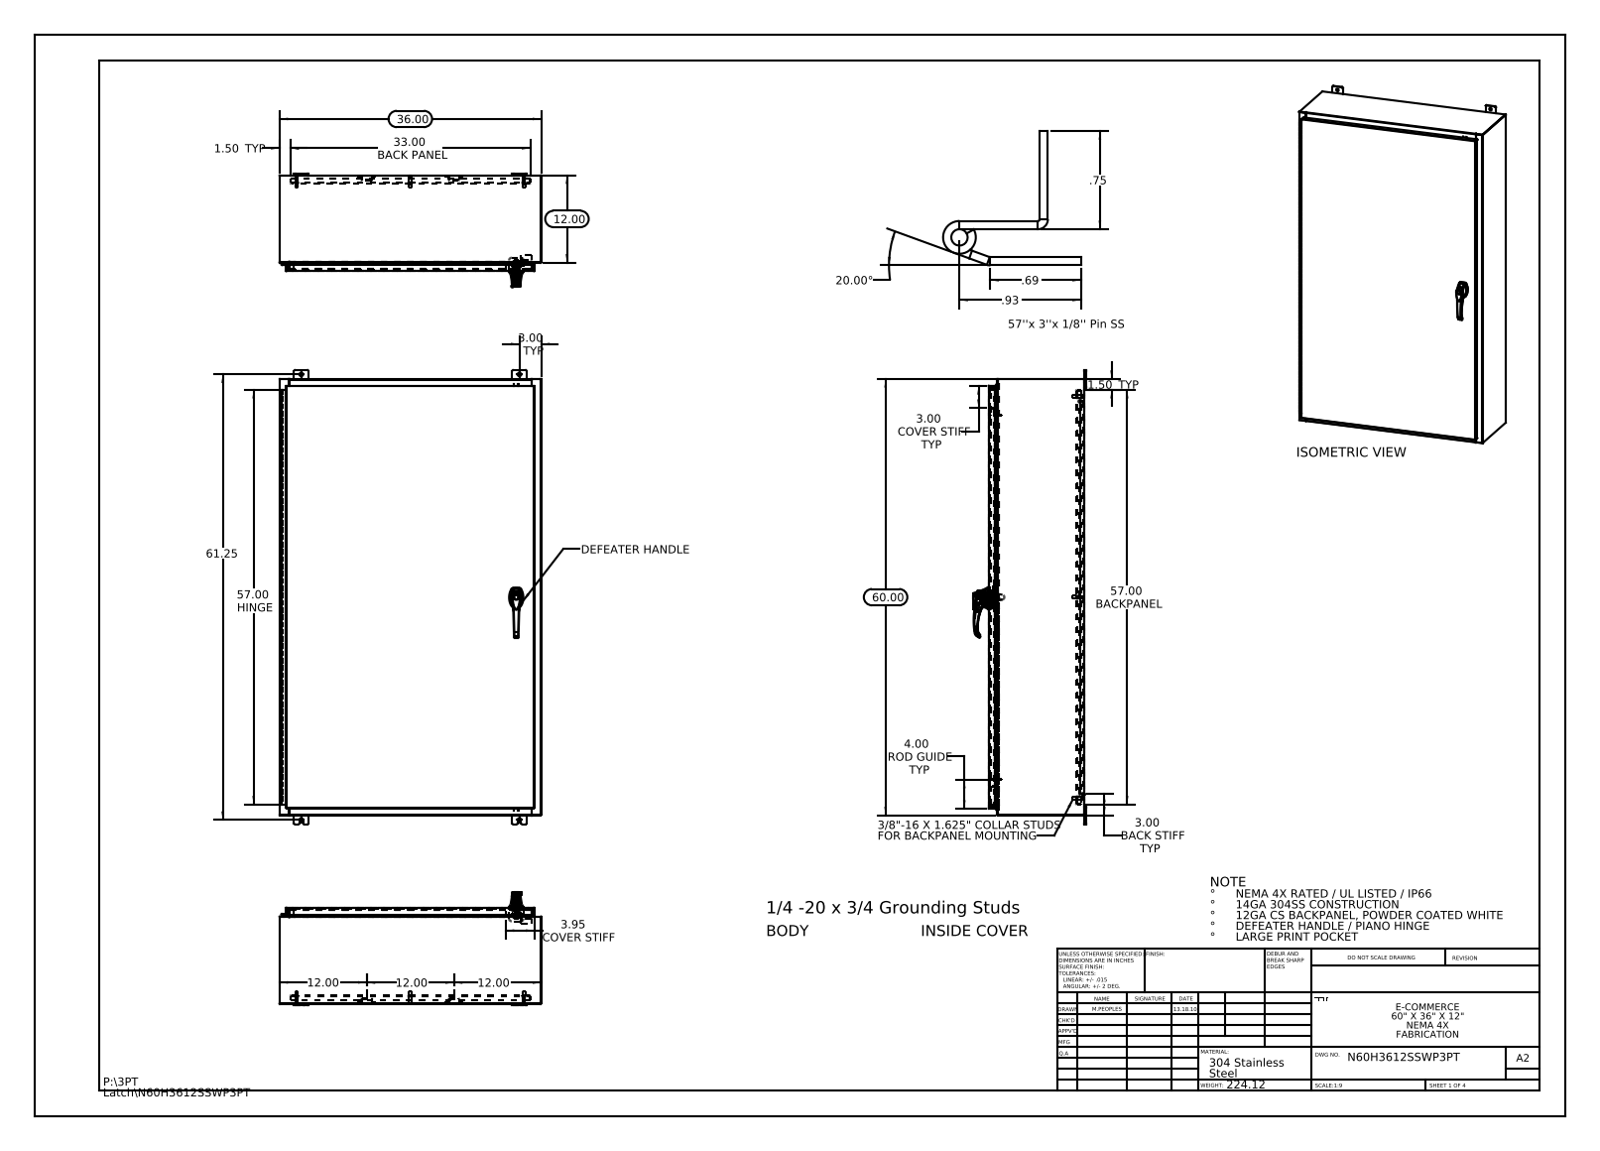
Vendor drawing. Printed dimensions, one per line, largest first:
61.25
60.00
57.00 HINGE
57.00 BACKPANEL
36.00
33.00 BACK PANEL
20.00°
12.00
12.00
12.00
12.00
4.00 ROD GUIDE TYP
3.95 COVER STIFF
3.00 TYP
3.00 BACK STIFF TYP
3.00 COVER STIFF TYP
1.50 TYP
1.50 TYP
.93
.75
.69
